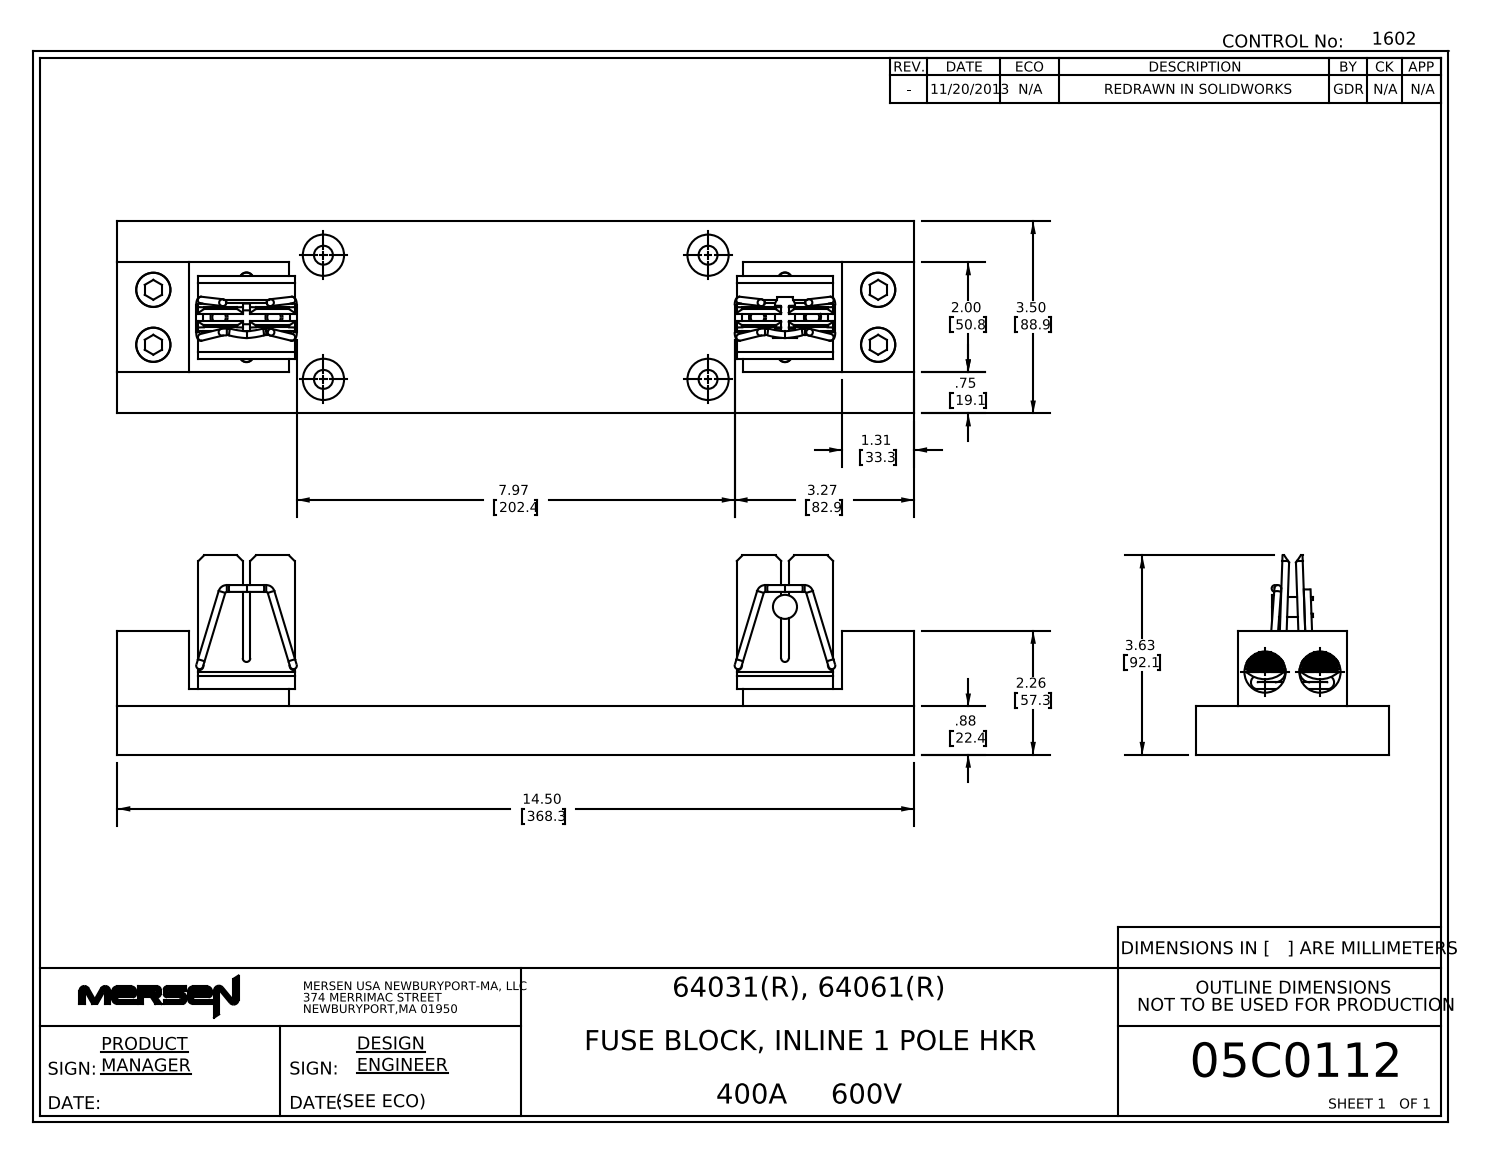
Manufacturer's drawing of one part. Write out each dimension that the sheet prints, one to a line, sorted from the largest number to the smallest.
14.50 368.3
7.97 202.4
3.63 92.1
3.50 88.9
3.27 82.9
2.26 57.3
2.00 50.8
1.31 33.3
.88 22.4
.75 19.1
